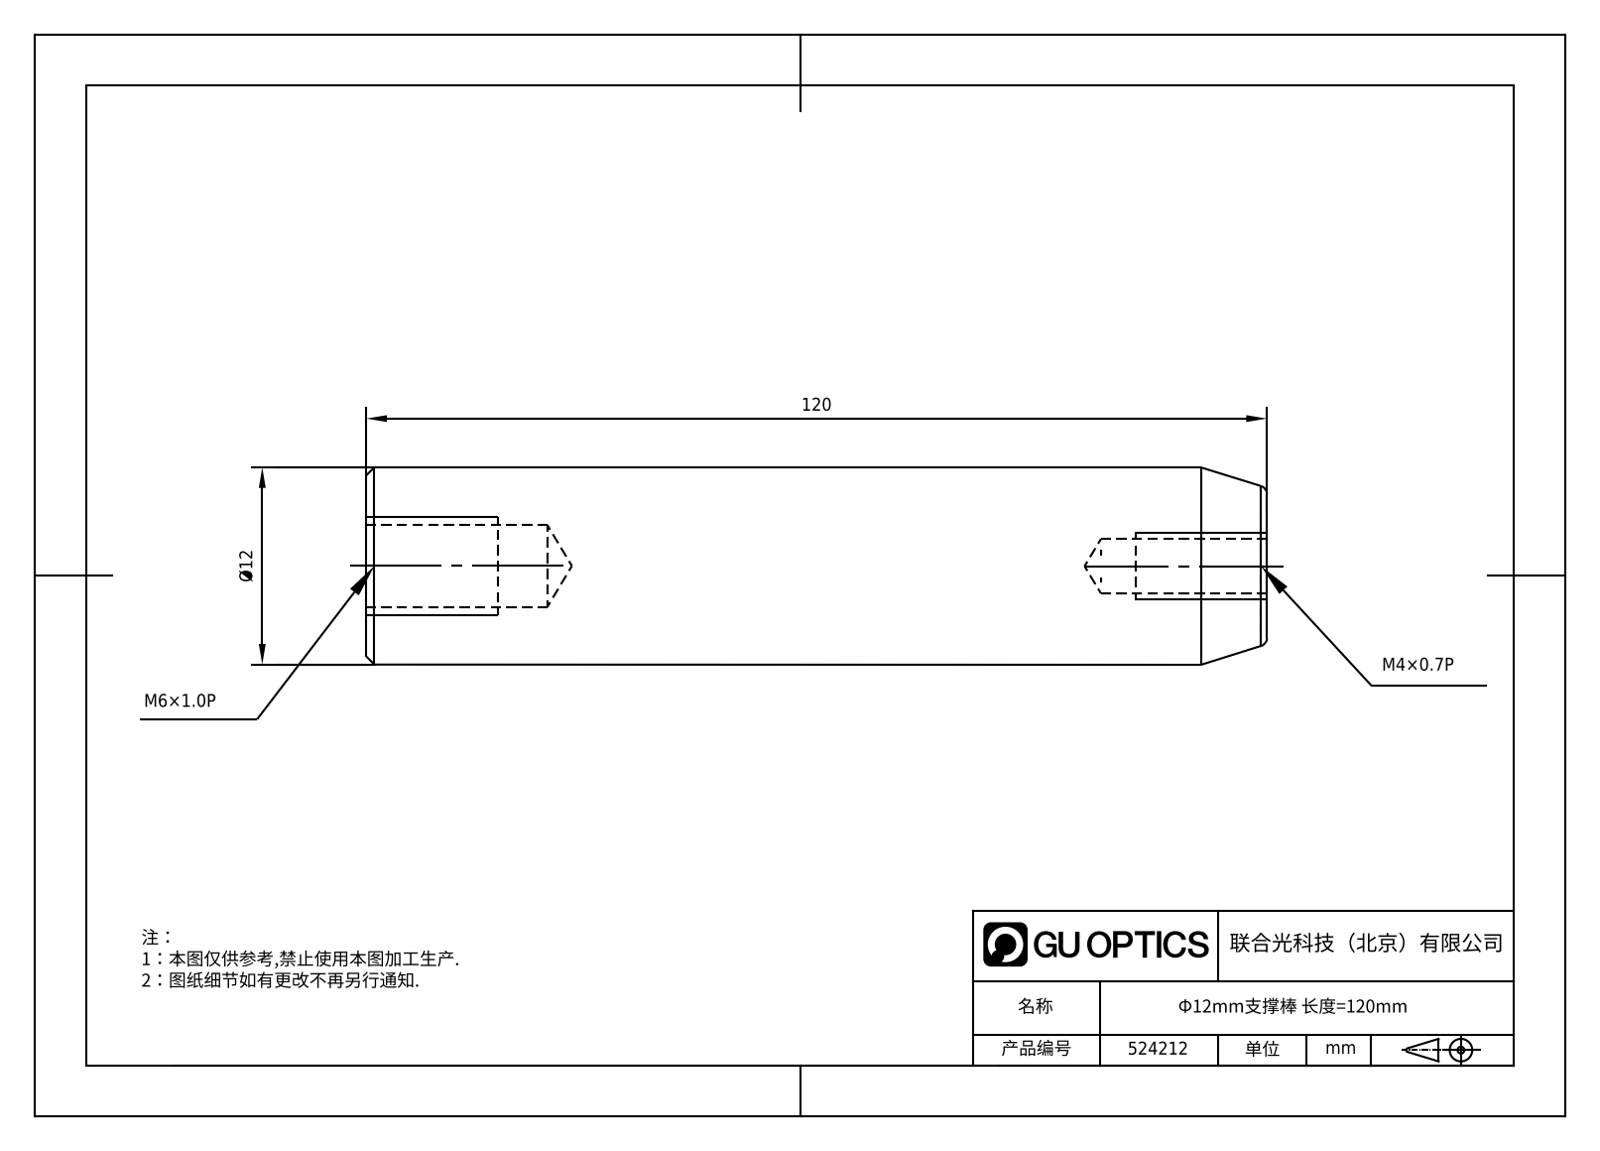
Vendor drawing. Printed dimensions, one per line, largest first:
120
Ø12
